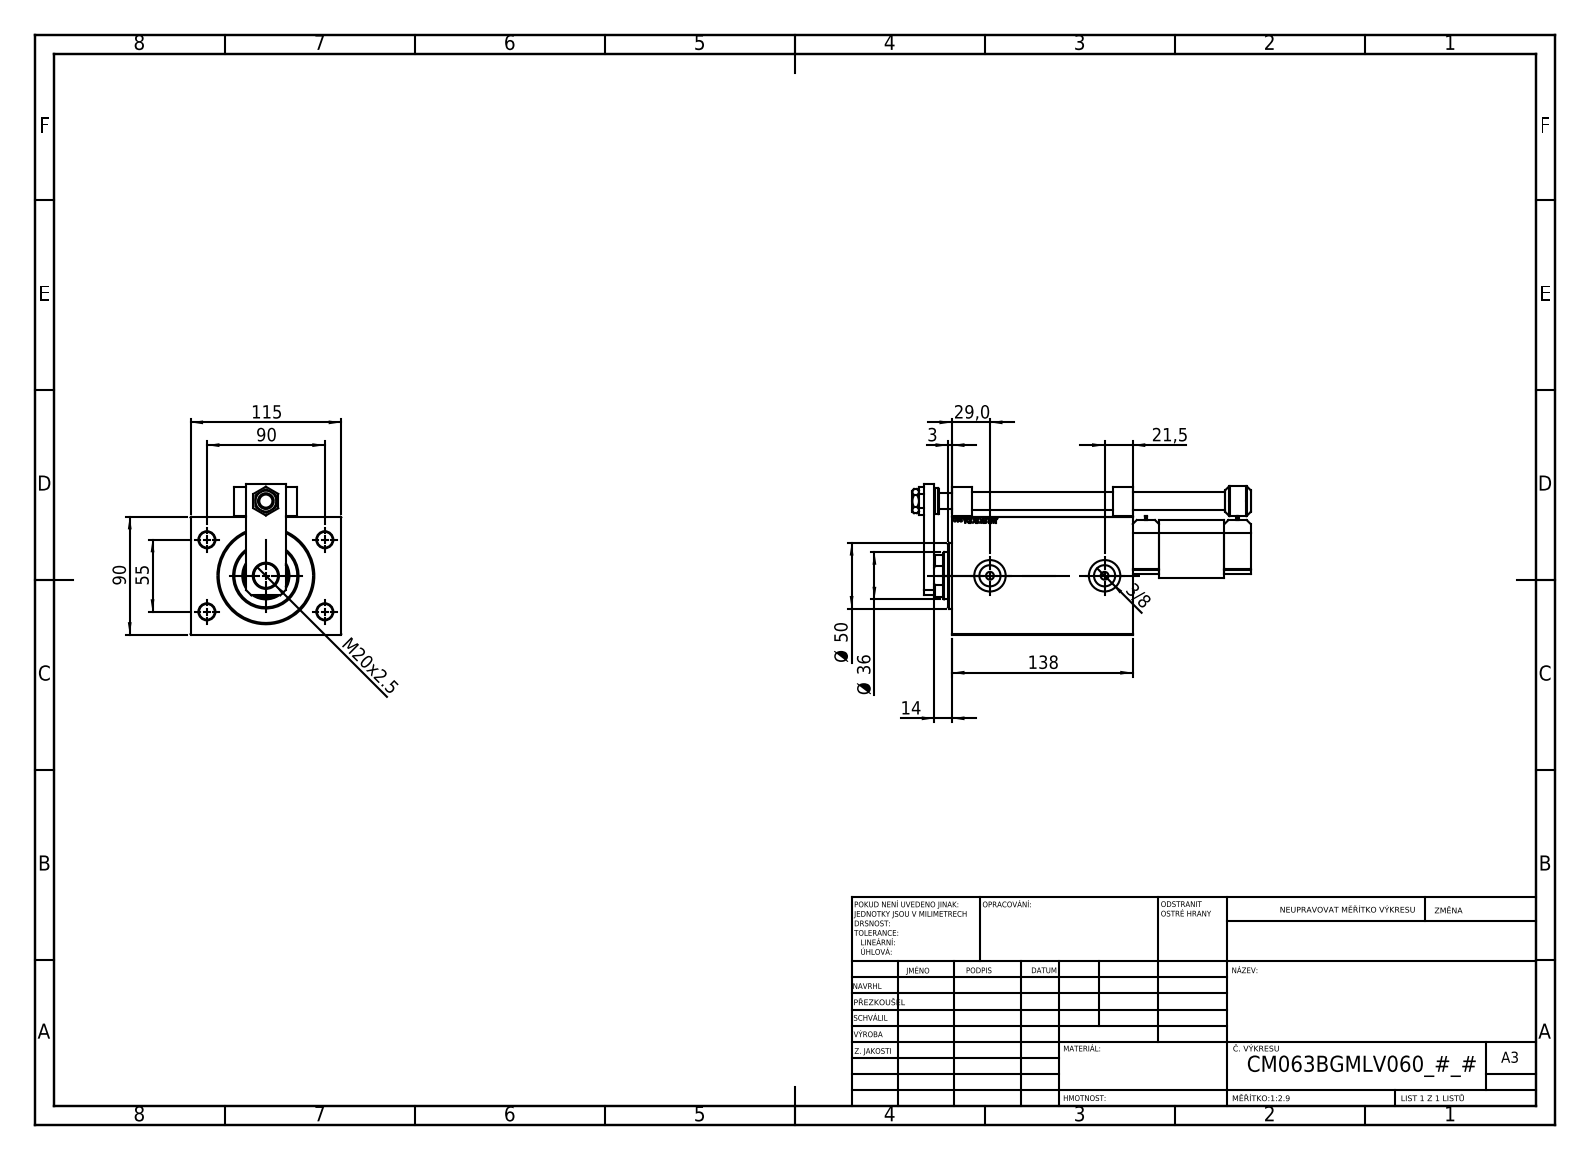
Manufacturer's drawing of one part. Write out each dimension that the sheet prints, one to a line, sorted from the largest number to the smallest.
138
115
90
90
55
Ø 50
Ø 36
29,0
21,5
M20x2.5
14
3
3/8
